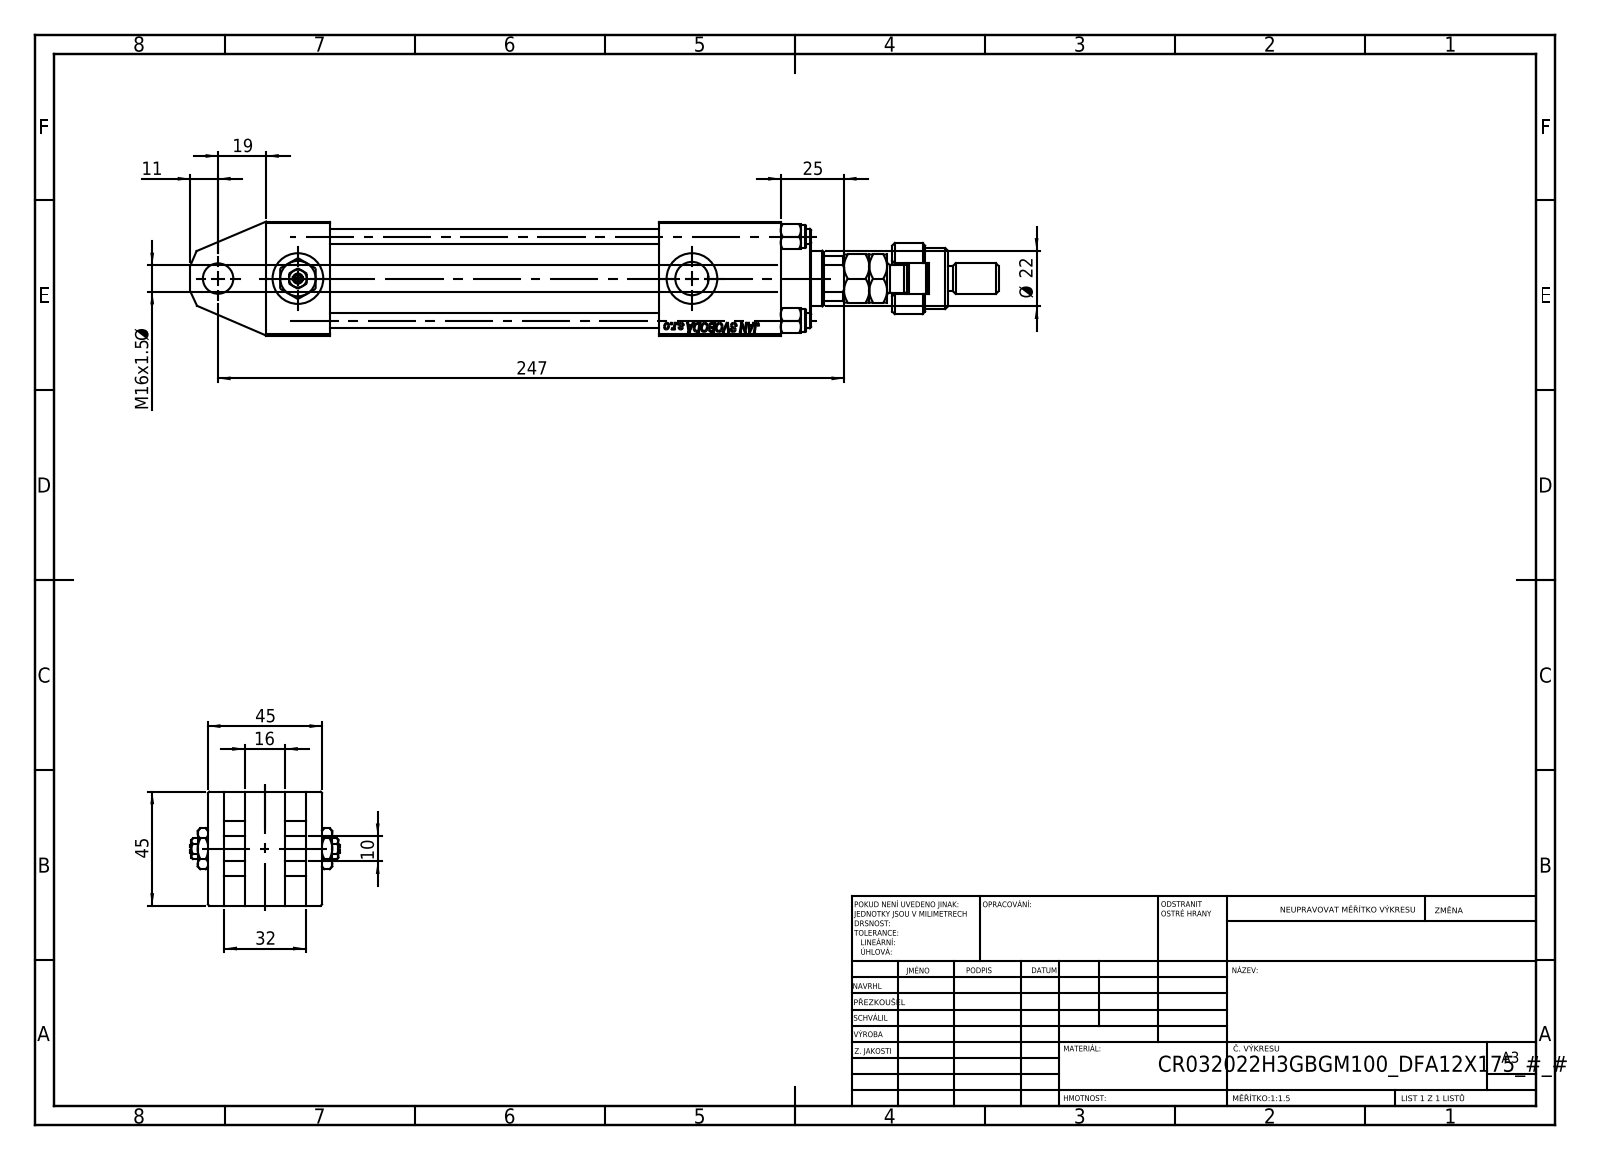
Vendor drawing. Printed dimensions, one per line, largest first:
247
45
45
32
25
Ø 22
19
M16x1.5 Ø
16
11
10
